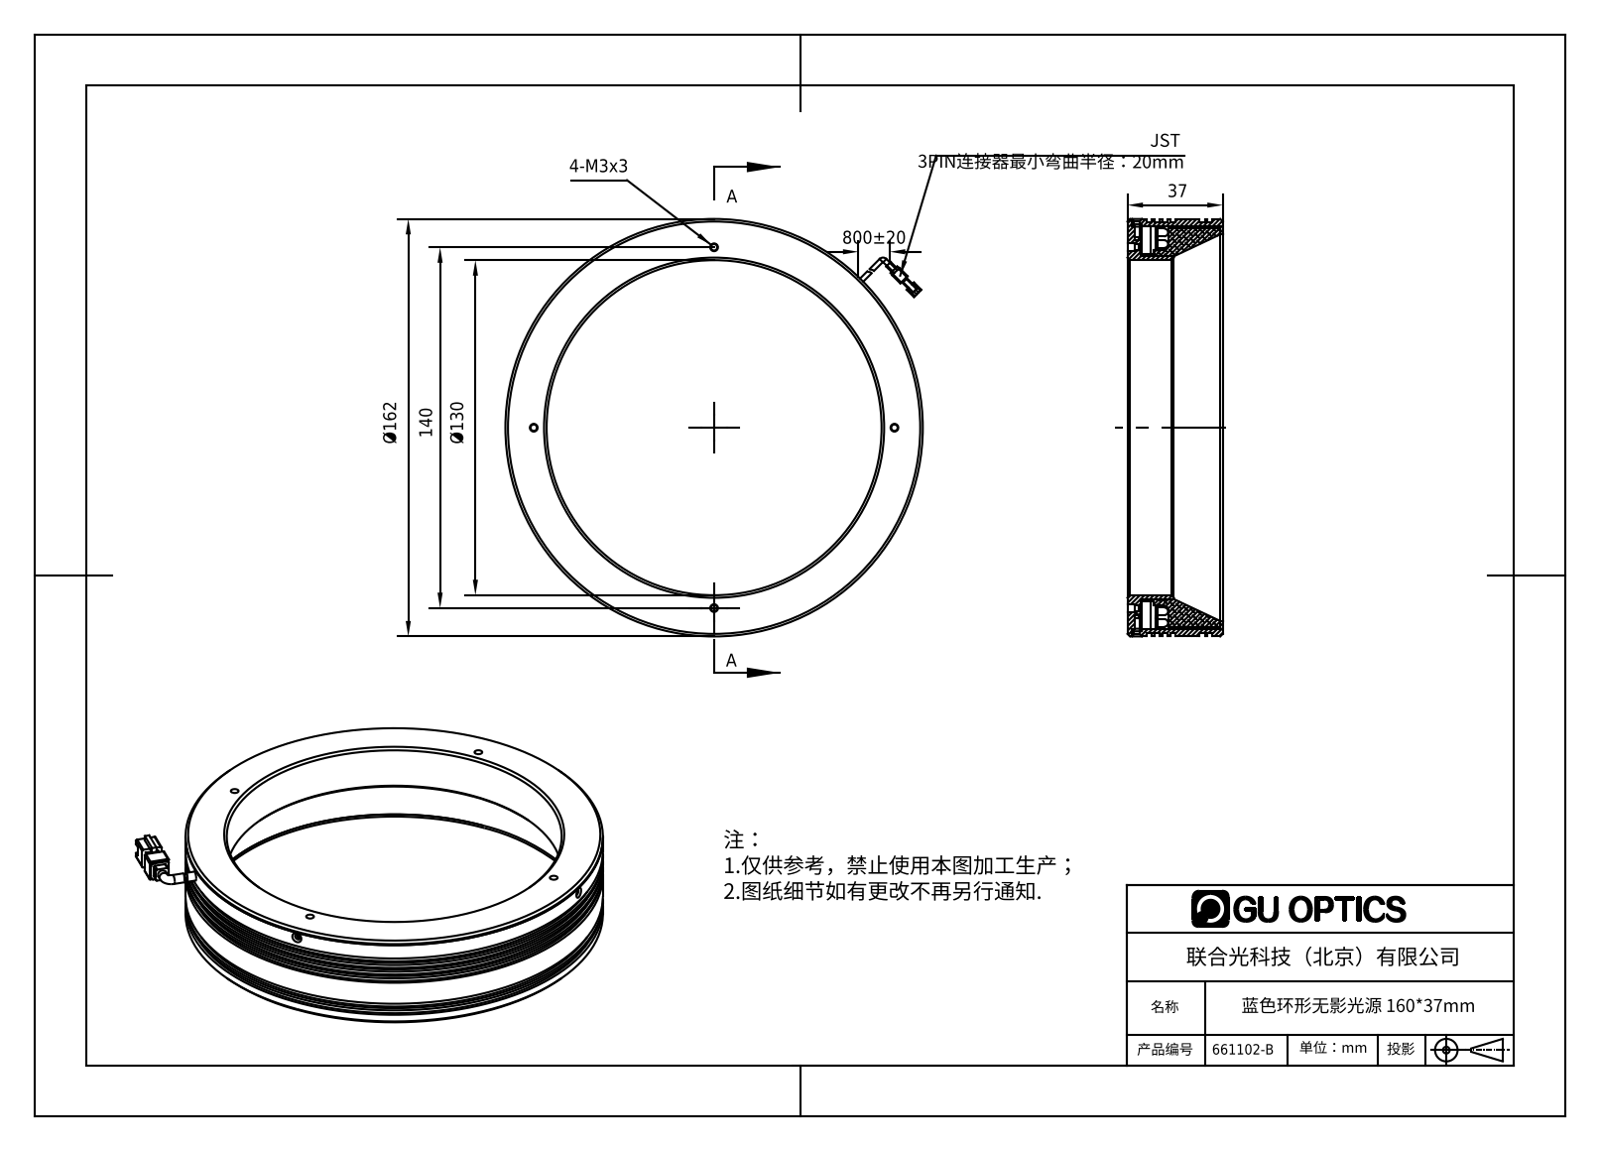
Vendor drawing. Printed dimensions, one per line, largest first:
800±20
Ø162
140
Ø130
37
